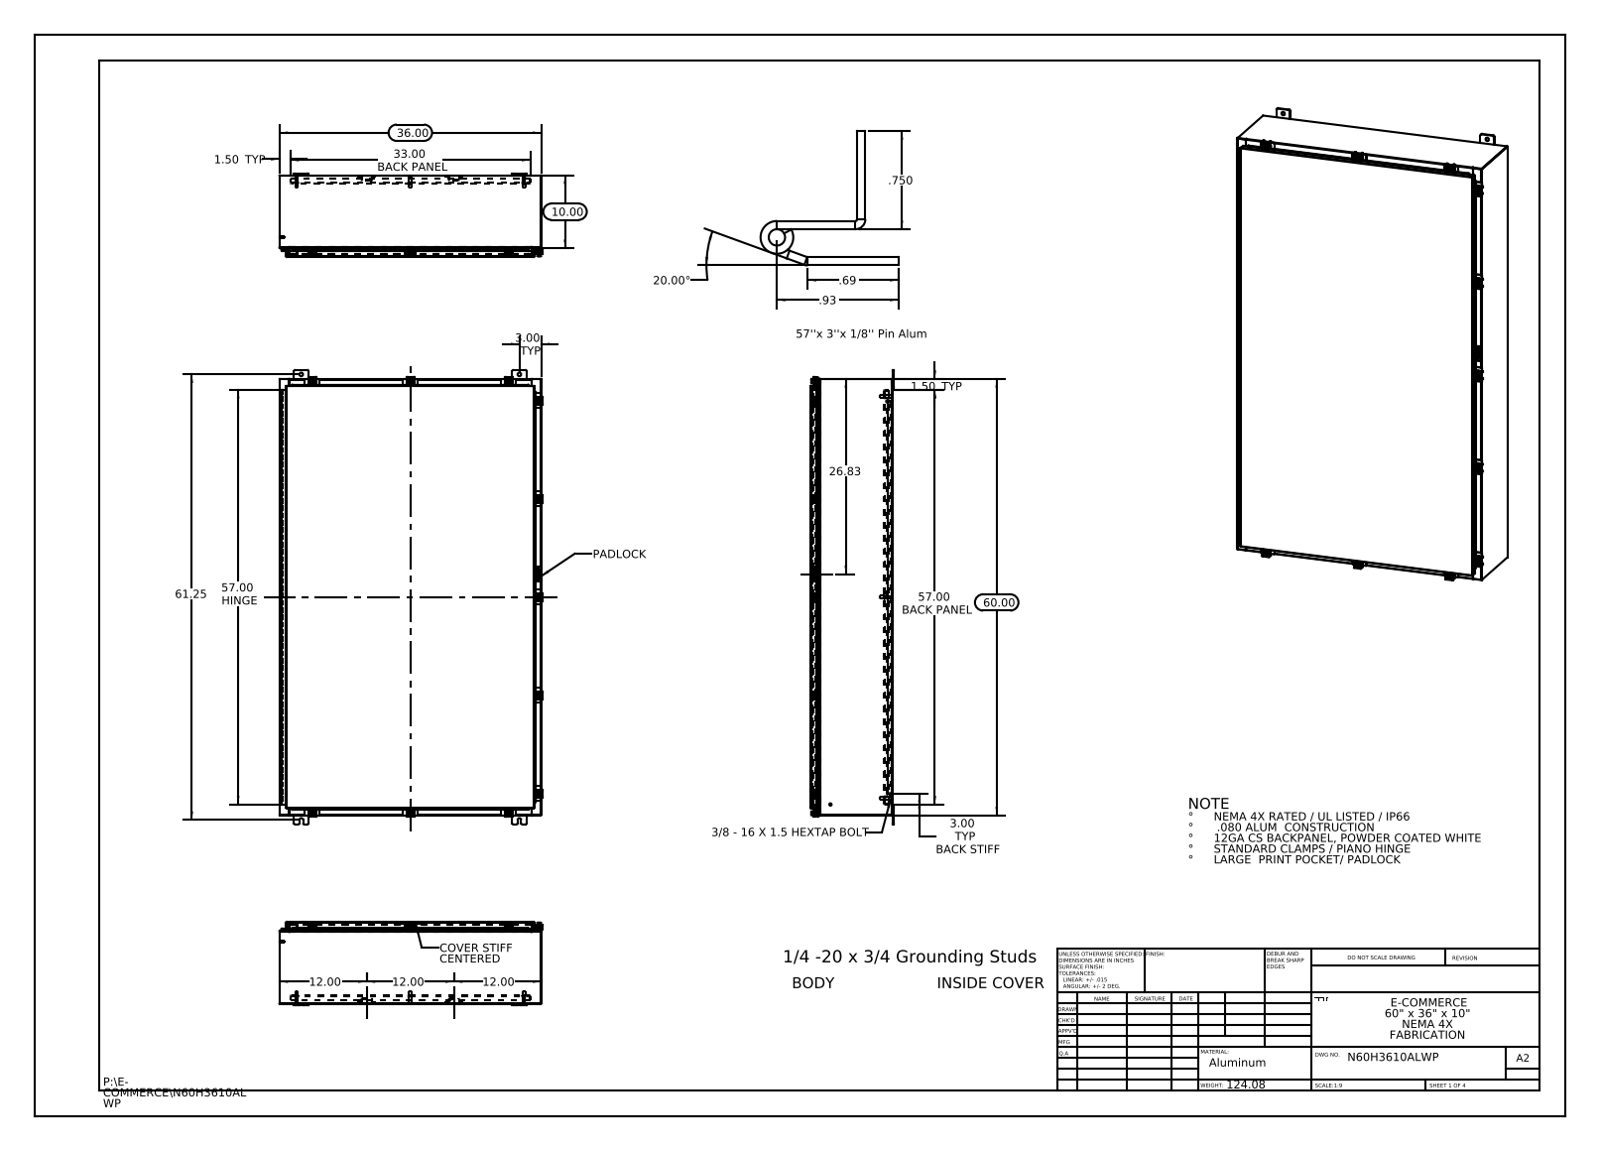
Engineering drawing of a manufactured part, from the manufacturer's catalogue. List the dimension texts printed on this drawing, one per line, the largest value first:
61.25
60.00
57.00 HINGE
57.00 BACK PANEL
36.00
33.00 BACK PANEL
26.83
20.00°
12.00
12.00
12.00
10.00
3.00 TYP
3.00 TYP BACK STIFF
1.50 TYP
1.50 TYP
.93
.750
.69
